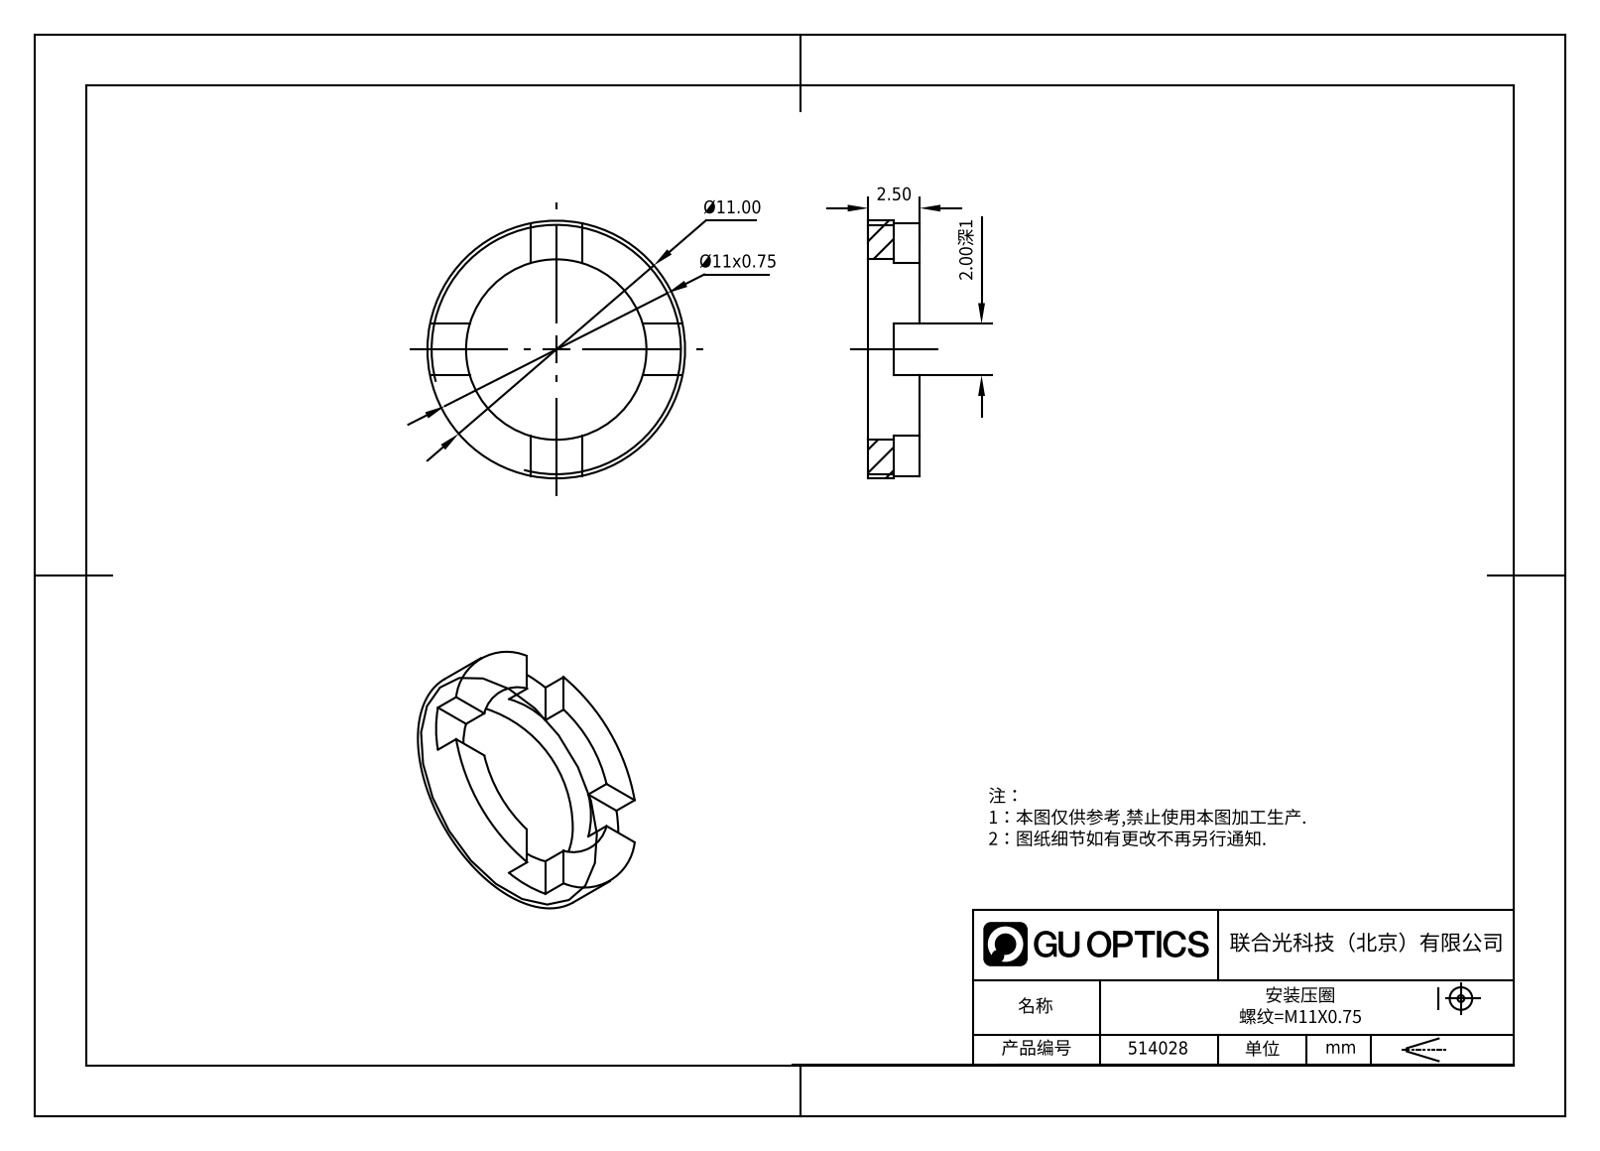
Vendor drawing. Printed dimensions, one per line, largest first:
Ø11.00
Ø11x0.75
2.50
2.00深1
